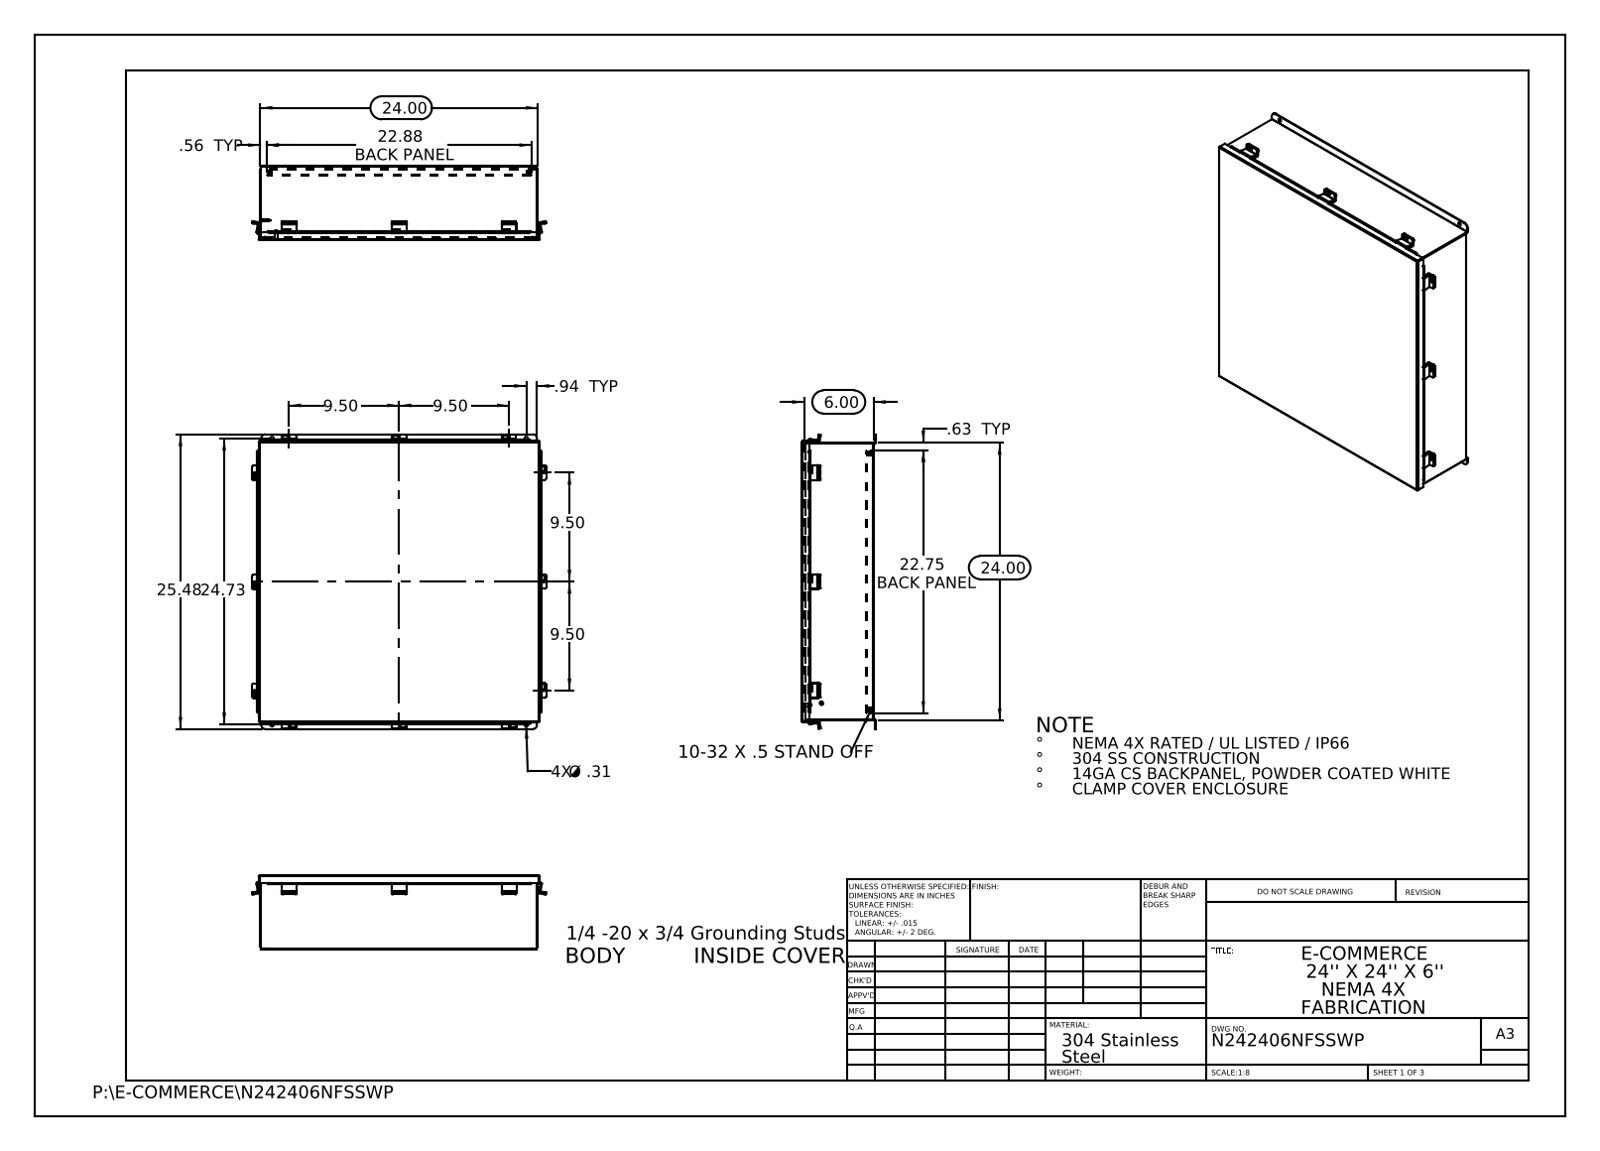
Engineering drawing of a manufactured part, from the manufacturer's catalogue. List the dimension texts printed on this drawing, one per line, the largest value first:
25.48
24.73
24.00
24.00
22.88 BACK PANEL
22.75 BACK PANEL
9.50
9.50
9.50
9.50
6.00
.94 TYP
.63 TYP
.56 TYP
4X Ø .31
